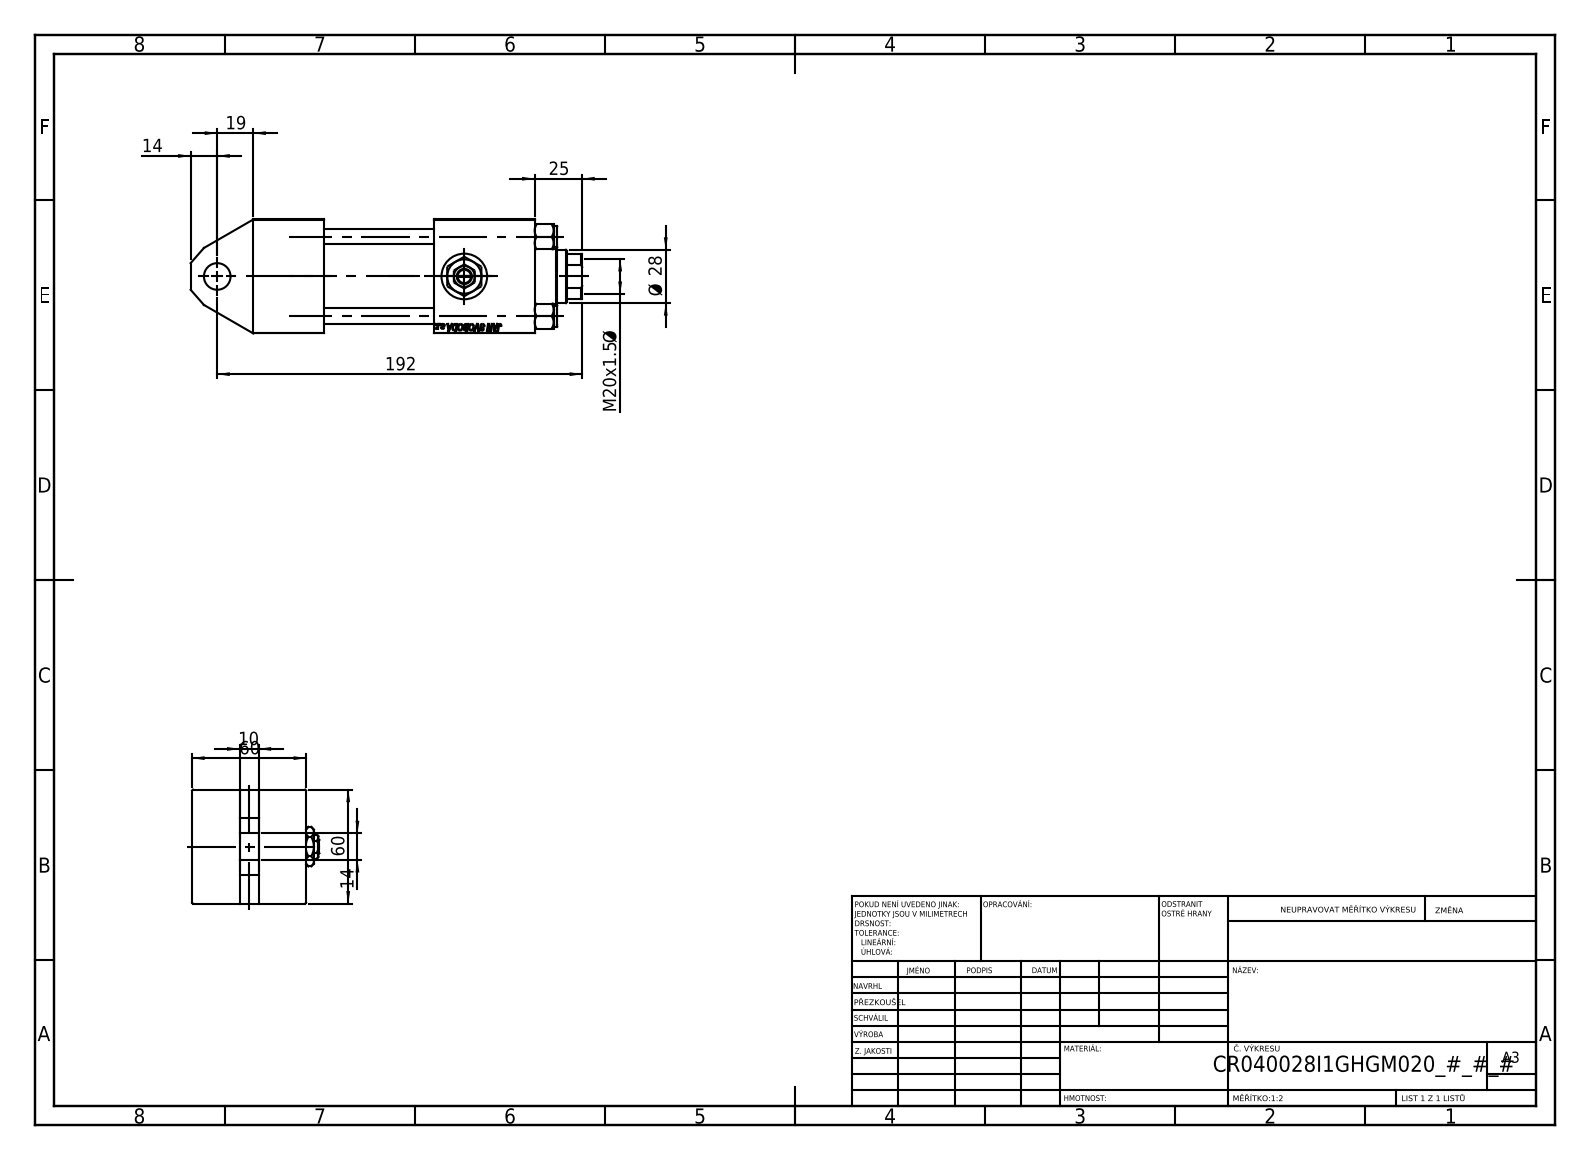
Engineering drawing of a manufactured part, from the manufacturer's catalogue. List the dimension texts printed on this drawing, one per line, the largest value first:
192
60
60
Ø 28
25
M20x1.5 Ø
19
14
14
10
